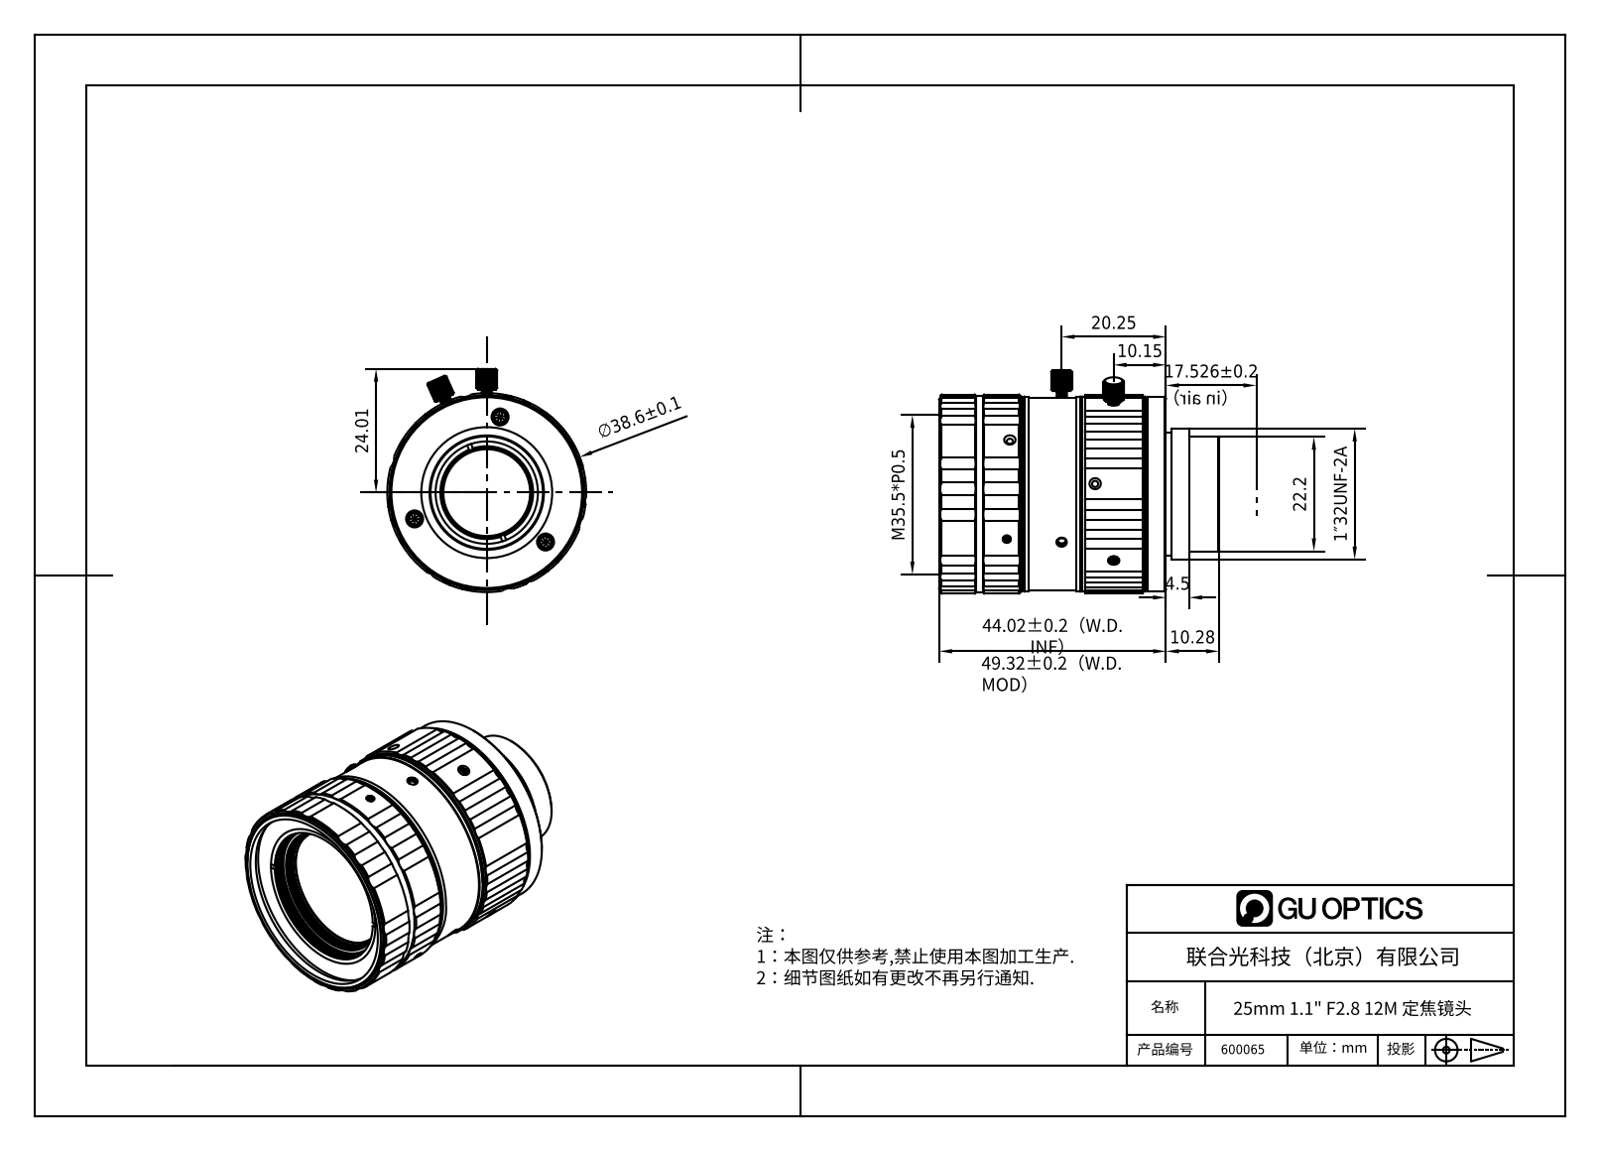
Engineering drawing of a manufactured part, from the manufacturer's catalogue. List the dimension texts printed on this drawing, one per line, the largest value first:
44.02±0.2（W.D. INF）
M35.5*P0.5
24.01
22.2
20.25
17.526±0.2
10.28
10.15
4.5
1″32UNF-2A
±0.1
